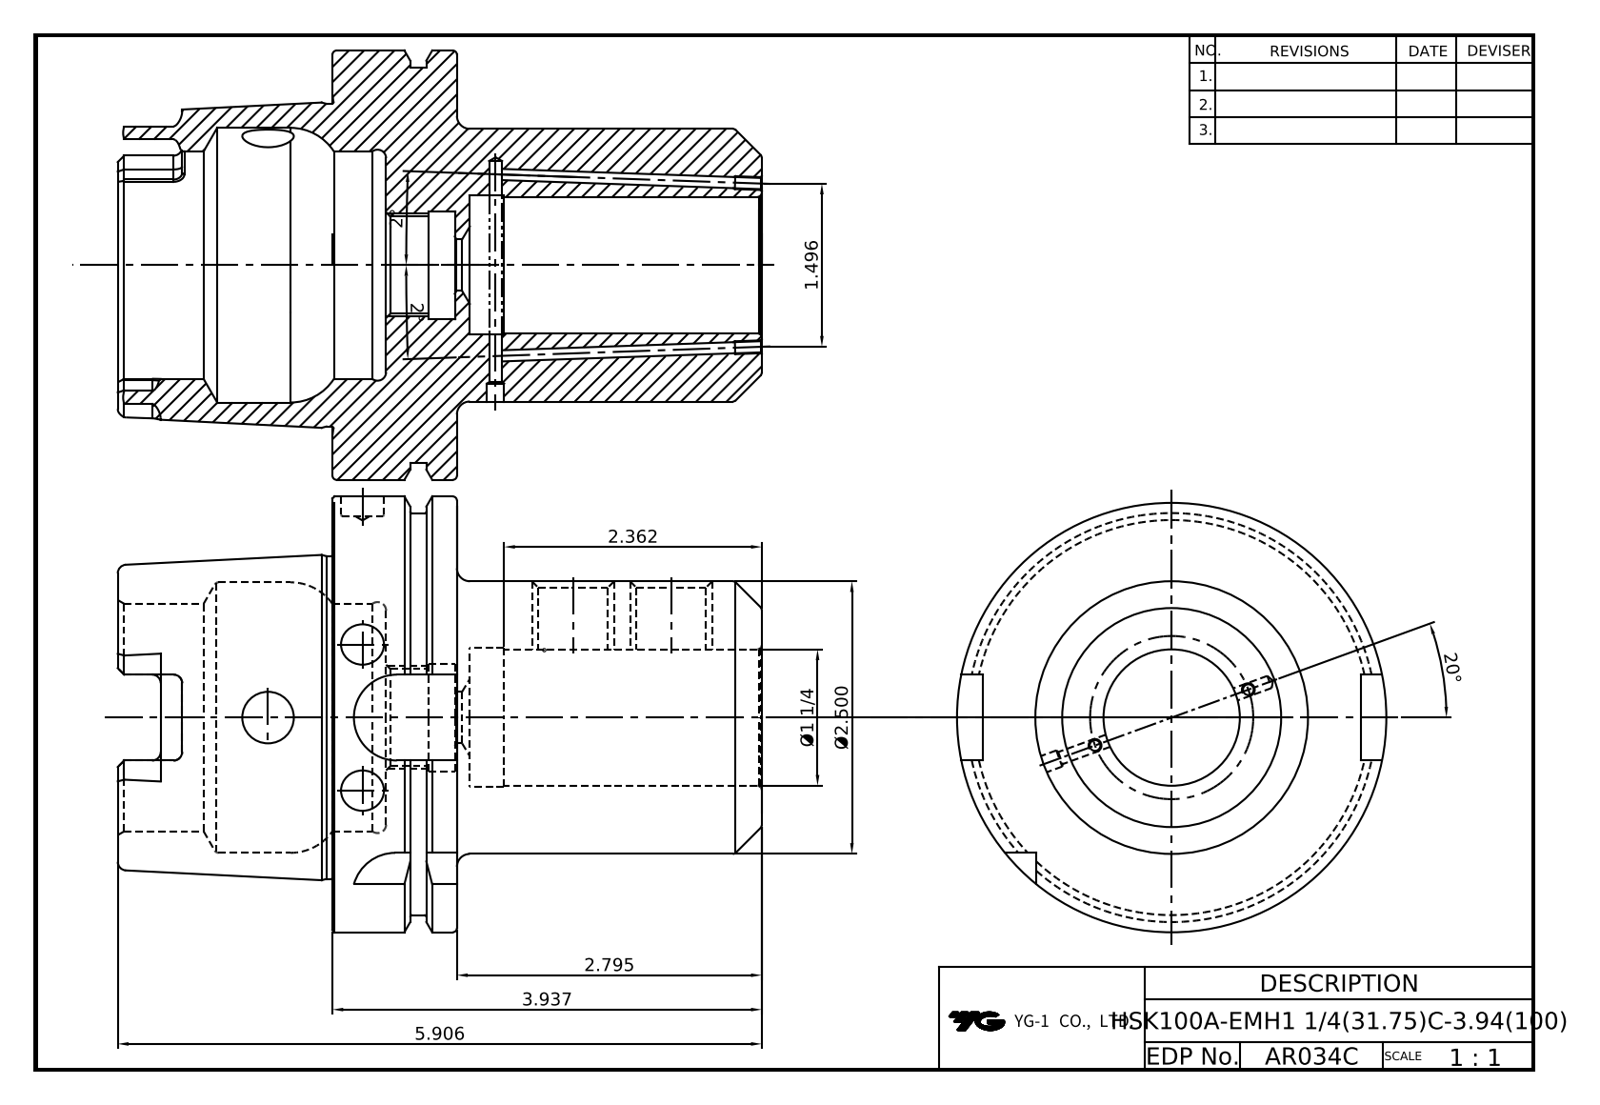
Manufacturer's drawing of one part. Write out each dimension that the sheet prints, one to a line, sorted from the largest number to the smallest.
20°
5.906
3.937
2.795
Ø2.500
2.362
2°
2°
1.496
Ø1 1/4
